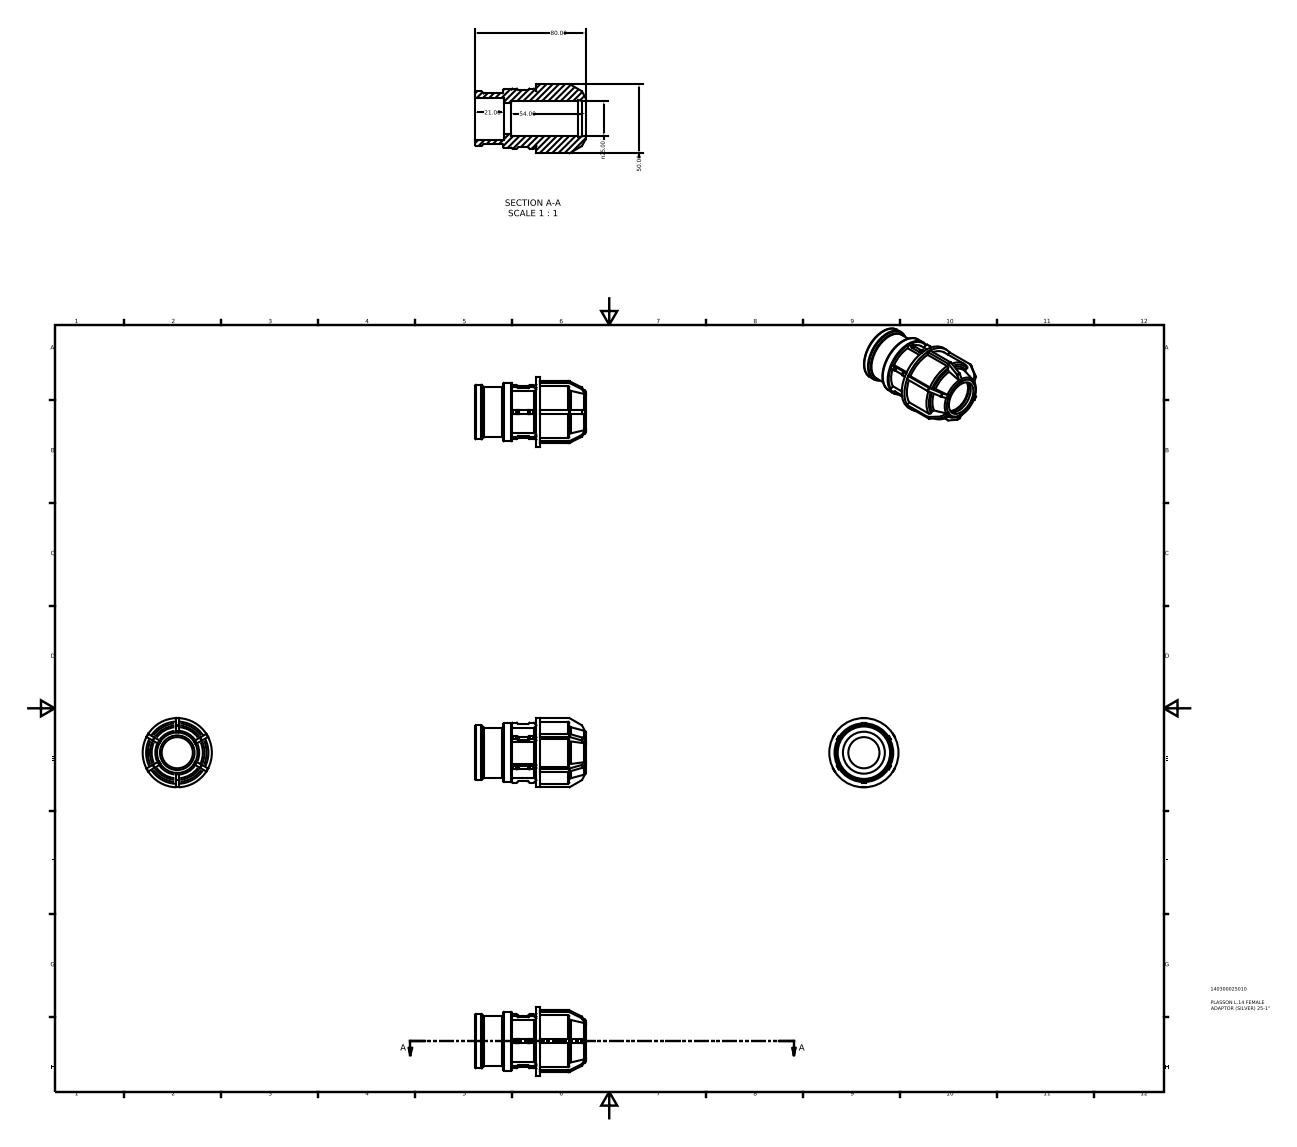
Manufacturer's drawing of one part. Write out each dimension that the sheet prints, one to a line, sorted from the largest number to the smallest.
80.00
54.00
50.00
n25.00
21.00
